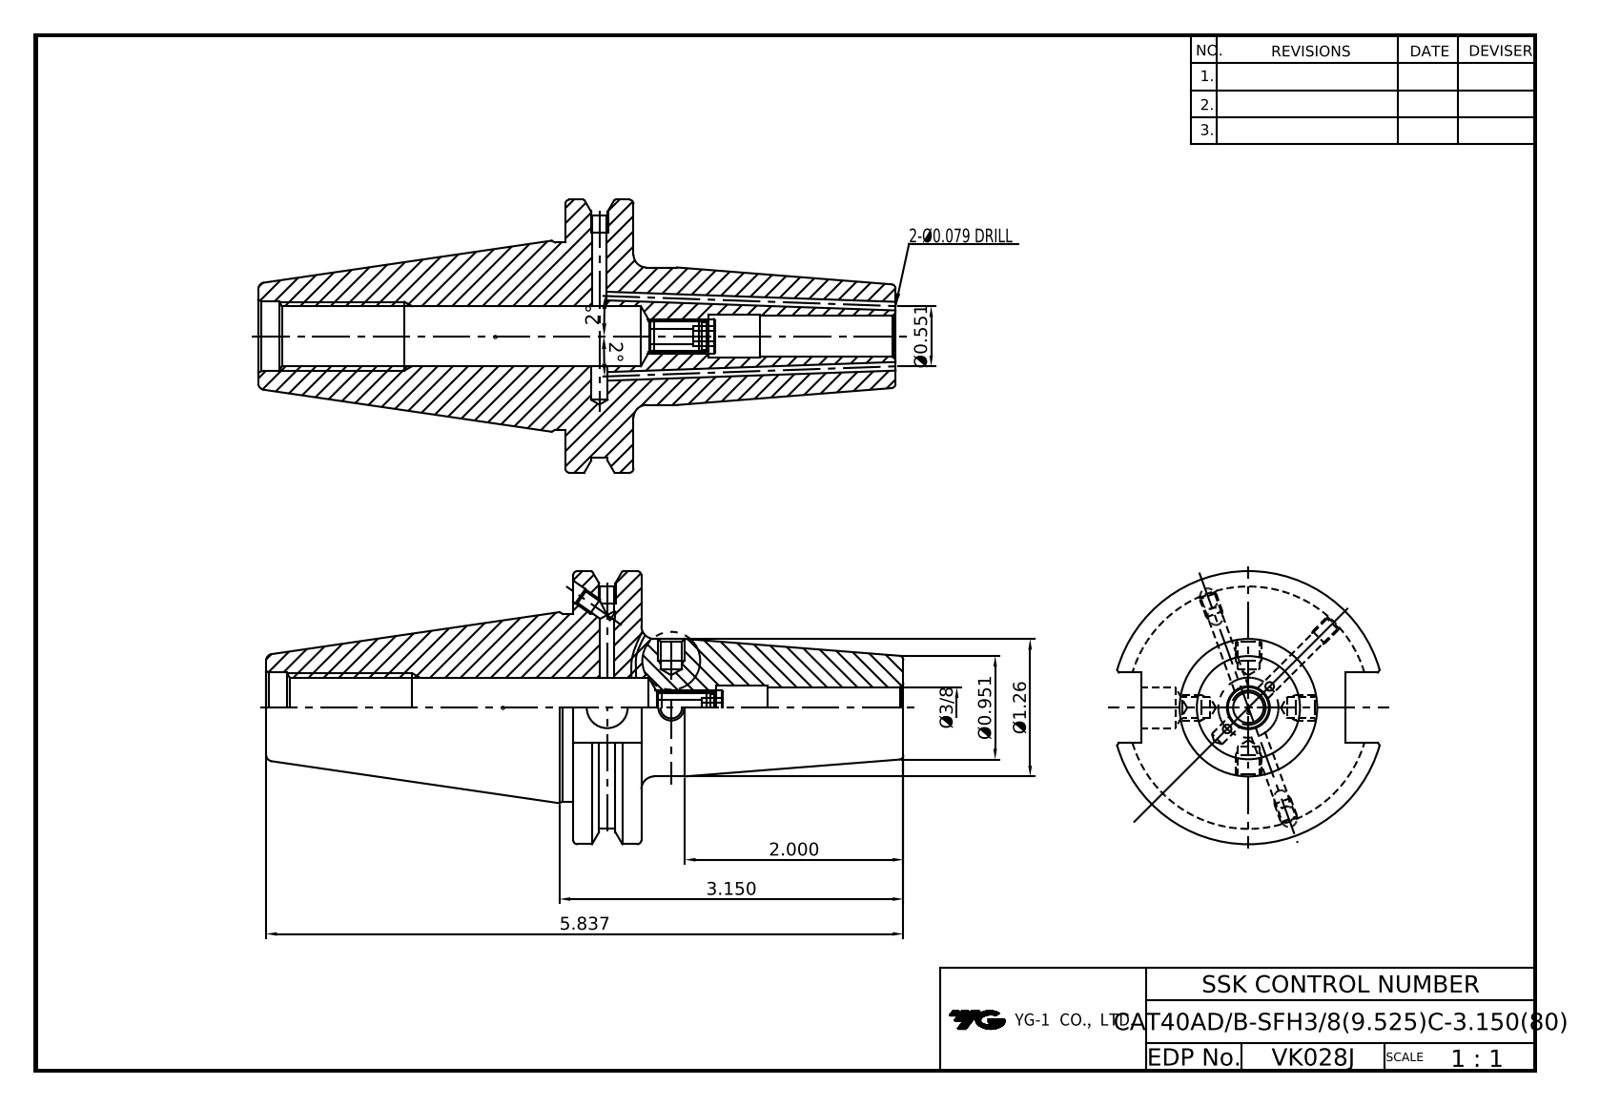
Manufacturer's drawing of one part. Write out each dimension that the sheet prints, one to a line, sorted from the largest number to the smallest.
5.837
3.150
2°
2°
2.000
Ø1.26
Ø0.951
Ø0.551
